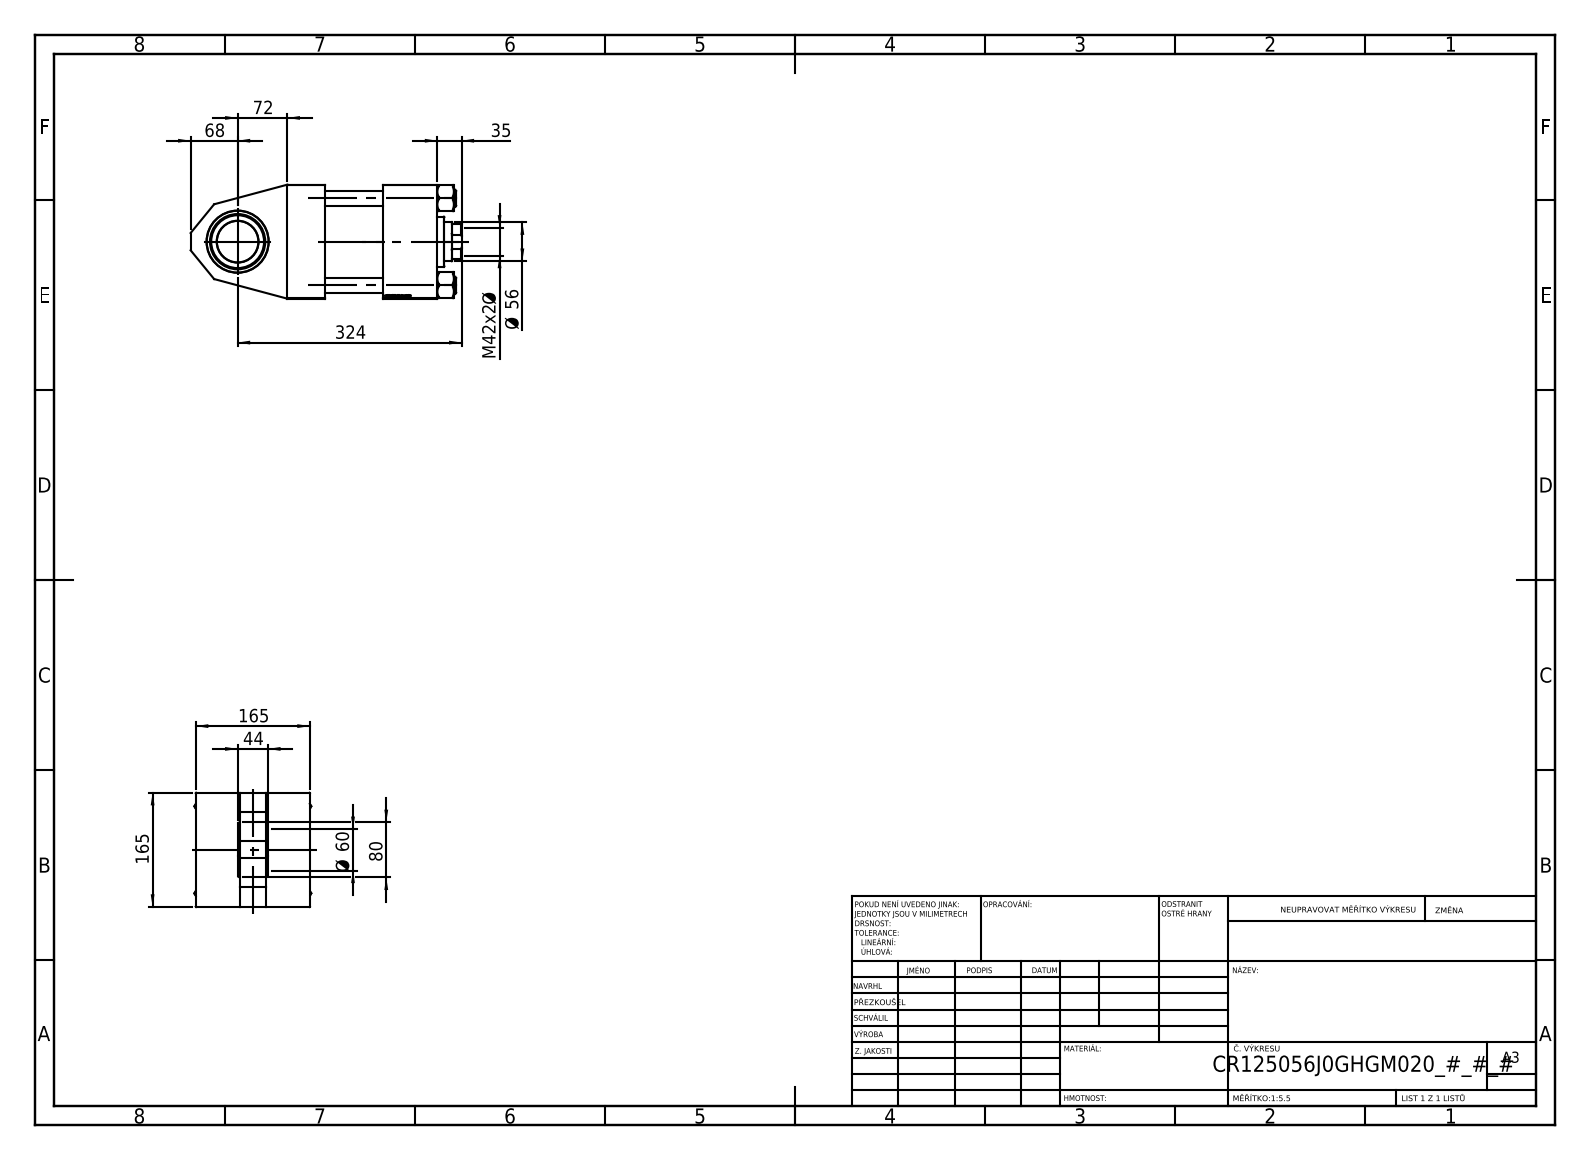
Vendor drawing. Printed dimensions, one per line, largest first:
324
165
165
80
72
68
Ø 60
Ø 56
44
M42x2 Ø
35
